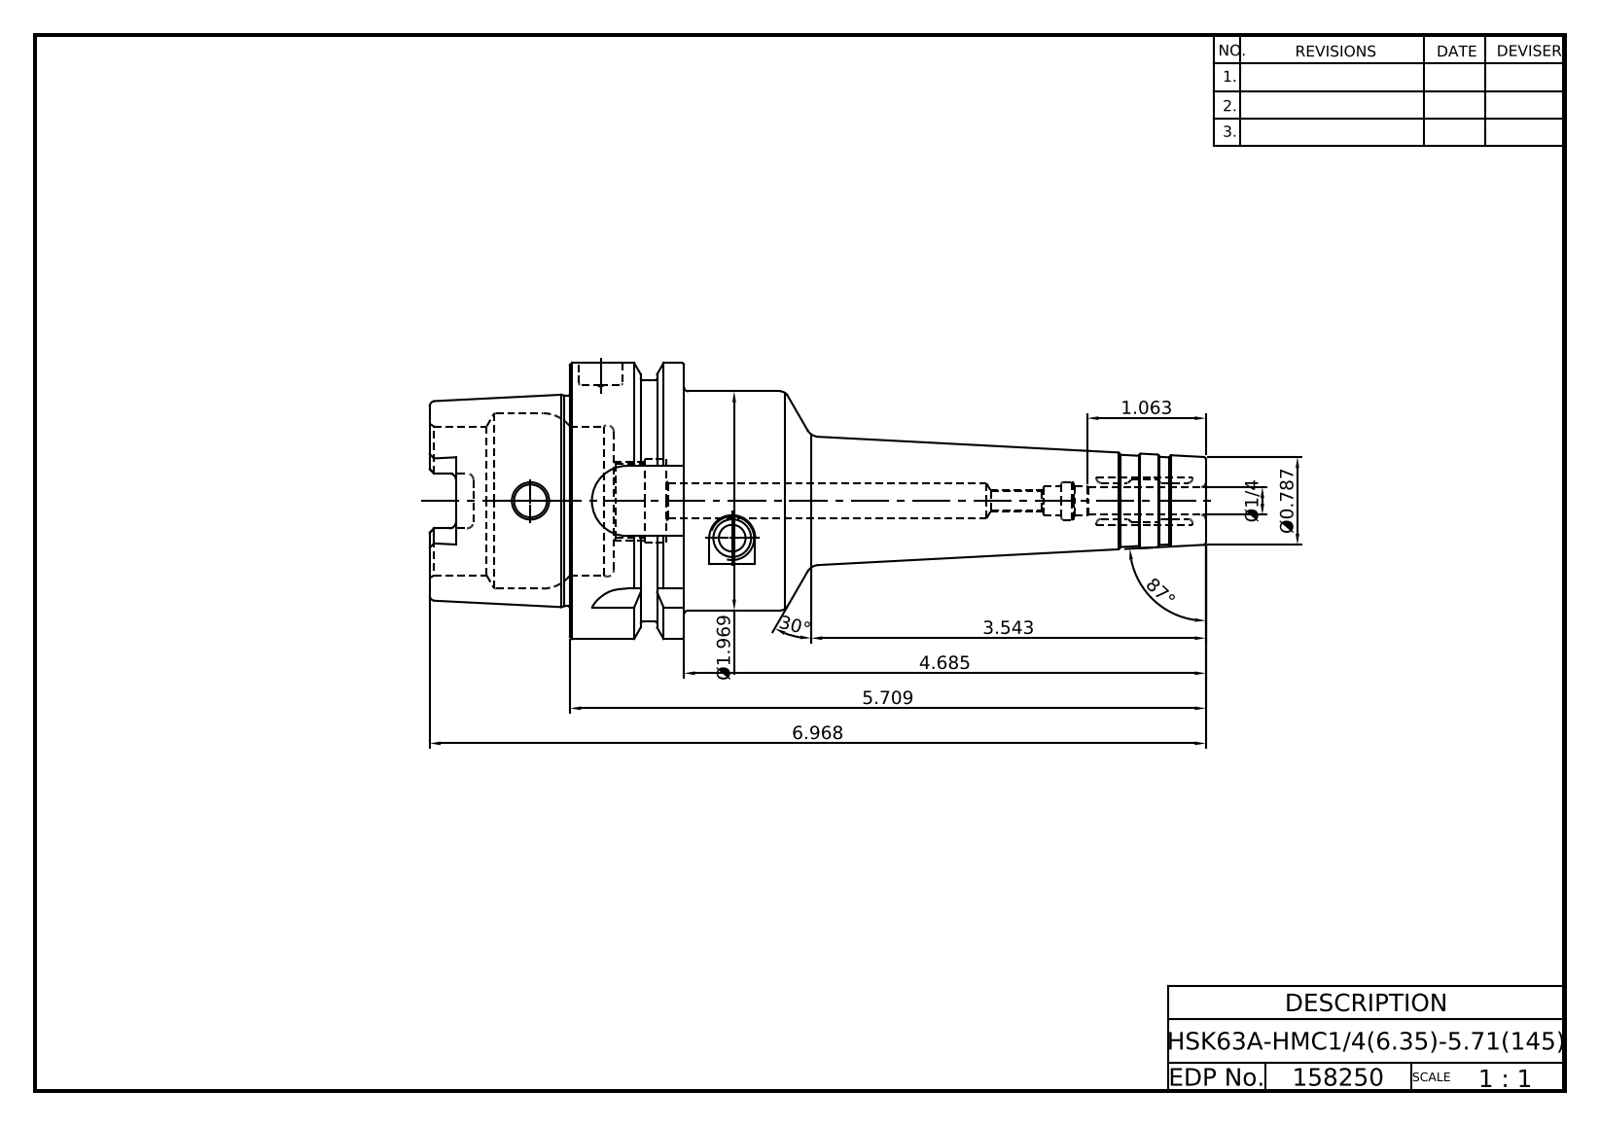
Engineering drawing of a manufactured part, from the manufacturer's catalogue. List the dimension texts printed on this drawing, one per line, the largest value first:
87°
30°
6.968
5.709
4.685
3.543
Ø1.969
1.063
Ø0.787
Ø1/4
